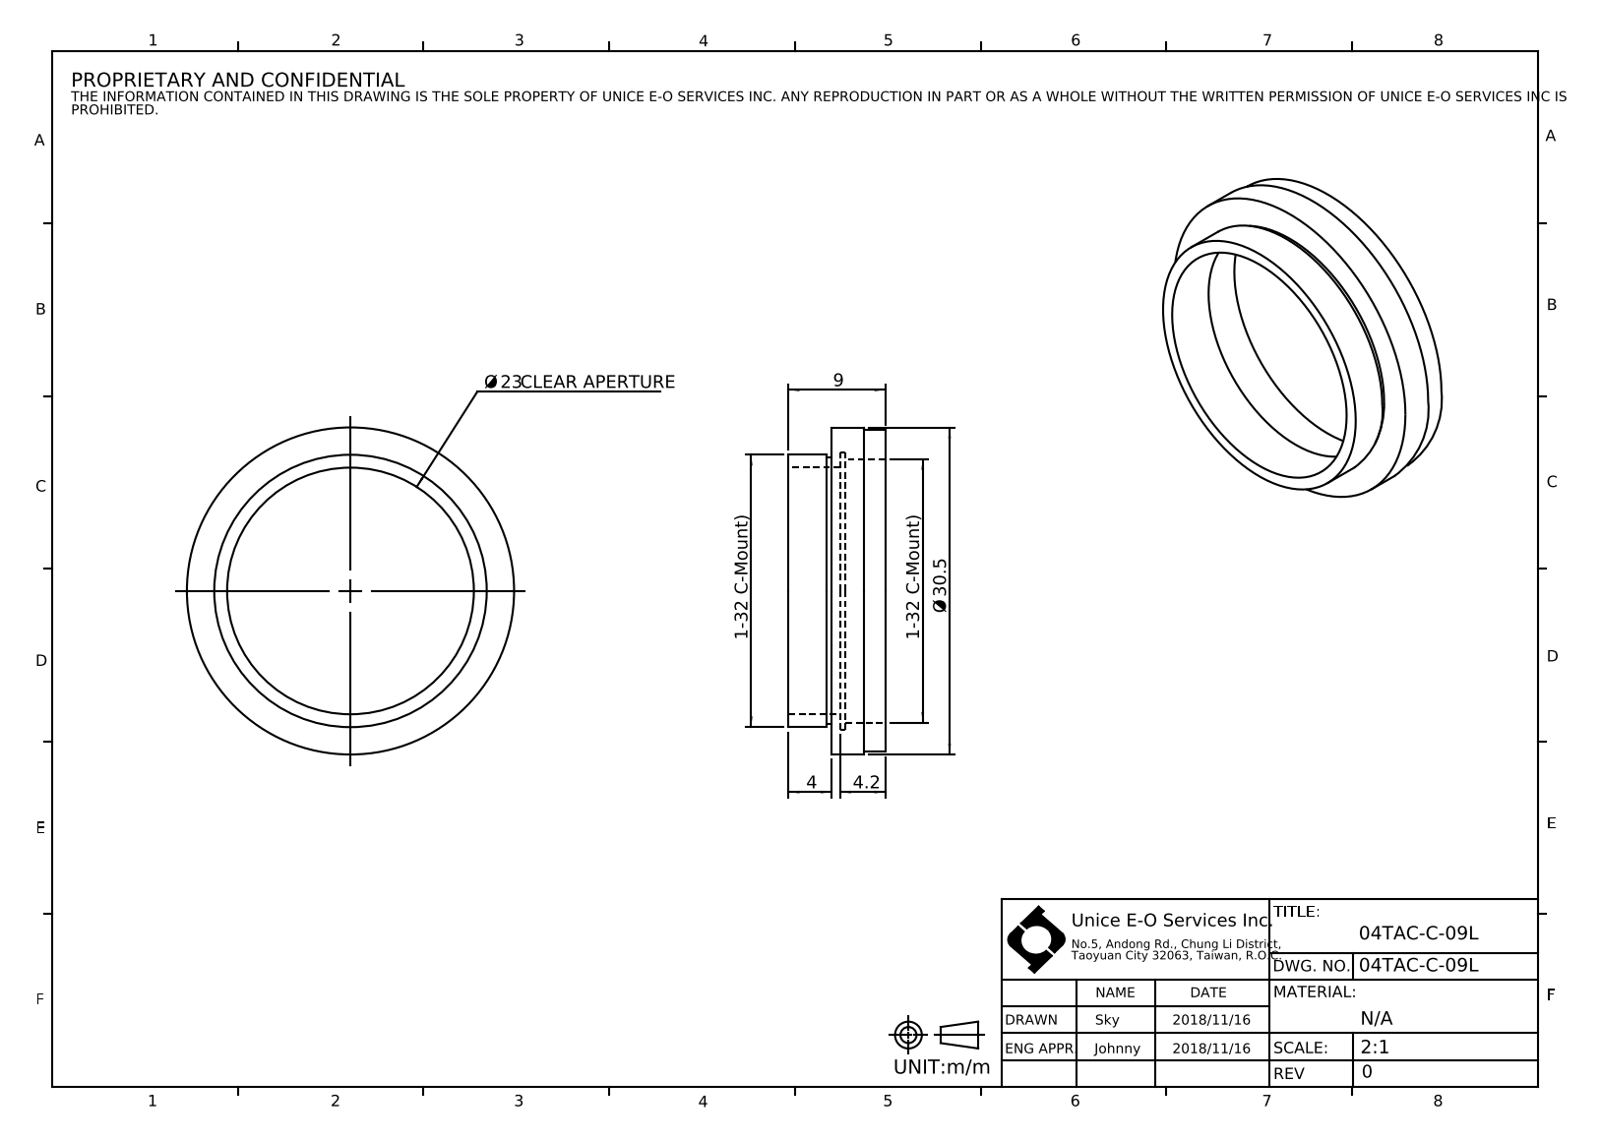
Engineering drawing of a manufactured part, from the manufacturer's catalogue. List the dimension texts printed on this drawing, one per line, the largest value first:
Ø 30.5
Ø 23 CLEAR APERTURE
9
4.2
4
1-32 C-Mount)
1-32 C-Mount)
